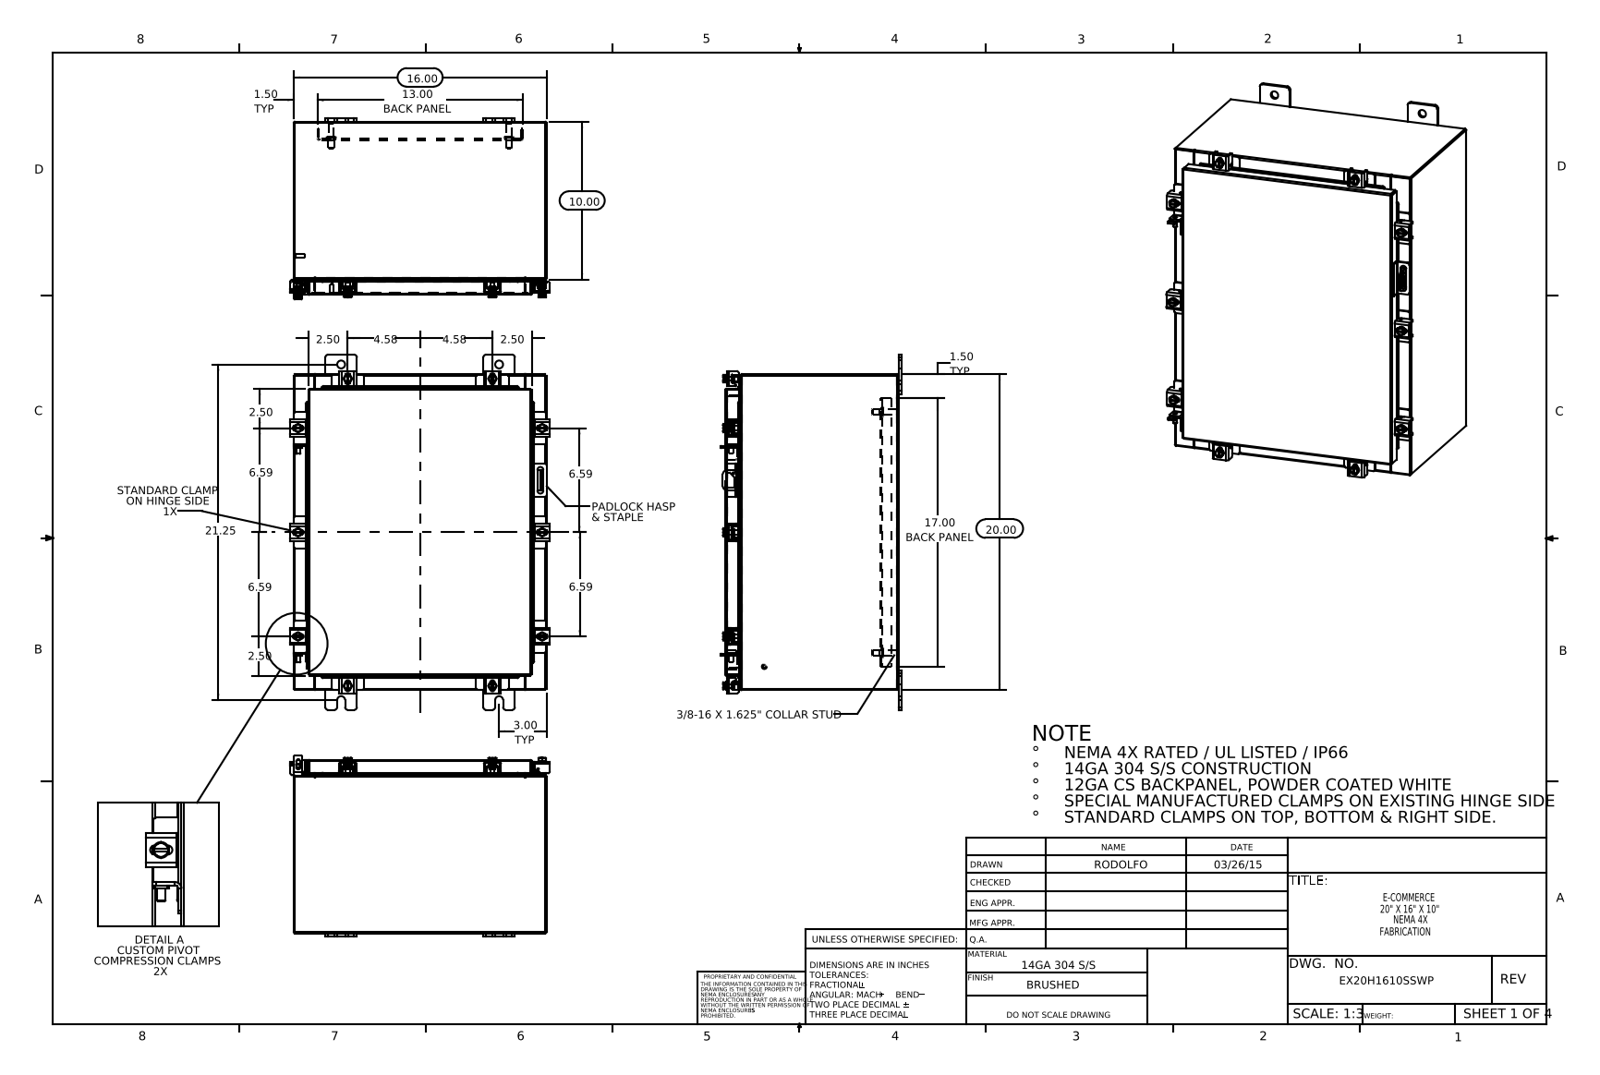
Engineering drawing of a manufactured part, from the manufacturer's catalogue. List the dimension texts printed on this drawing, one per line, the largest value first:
21.25
20.00
17.00 BACK PANEL
16.00
13.00 BACK PANEL
10.00
6.59
6.59
6.59
6.59
4.58
4.58
3.00 TYP
2.50
2.50
2.50
2.50
1.50 TYP
1.50 TYP
